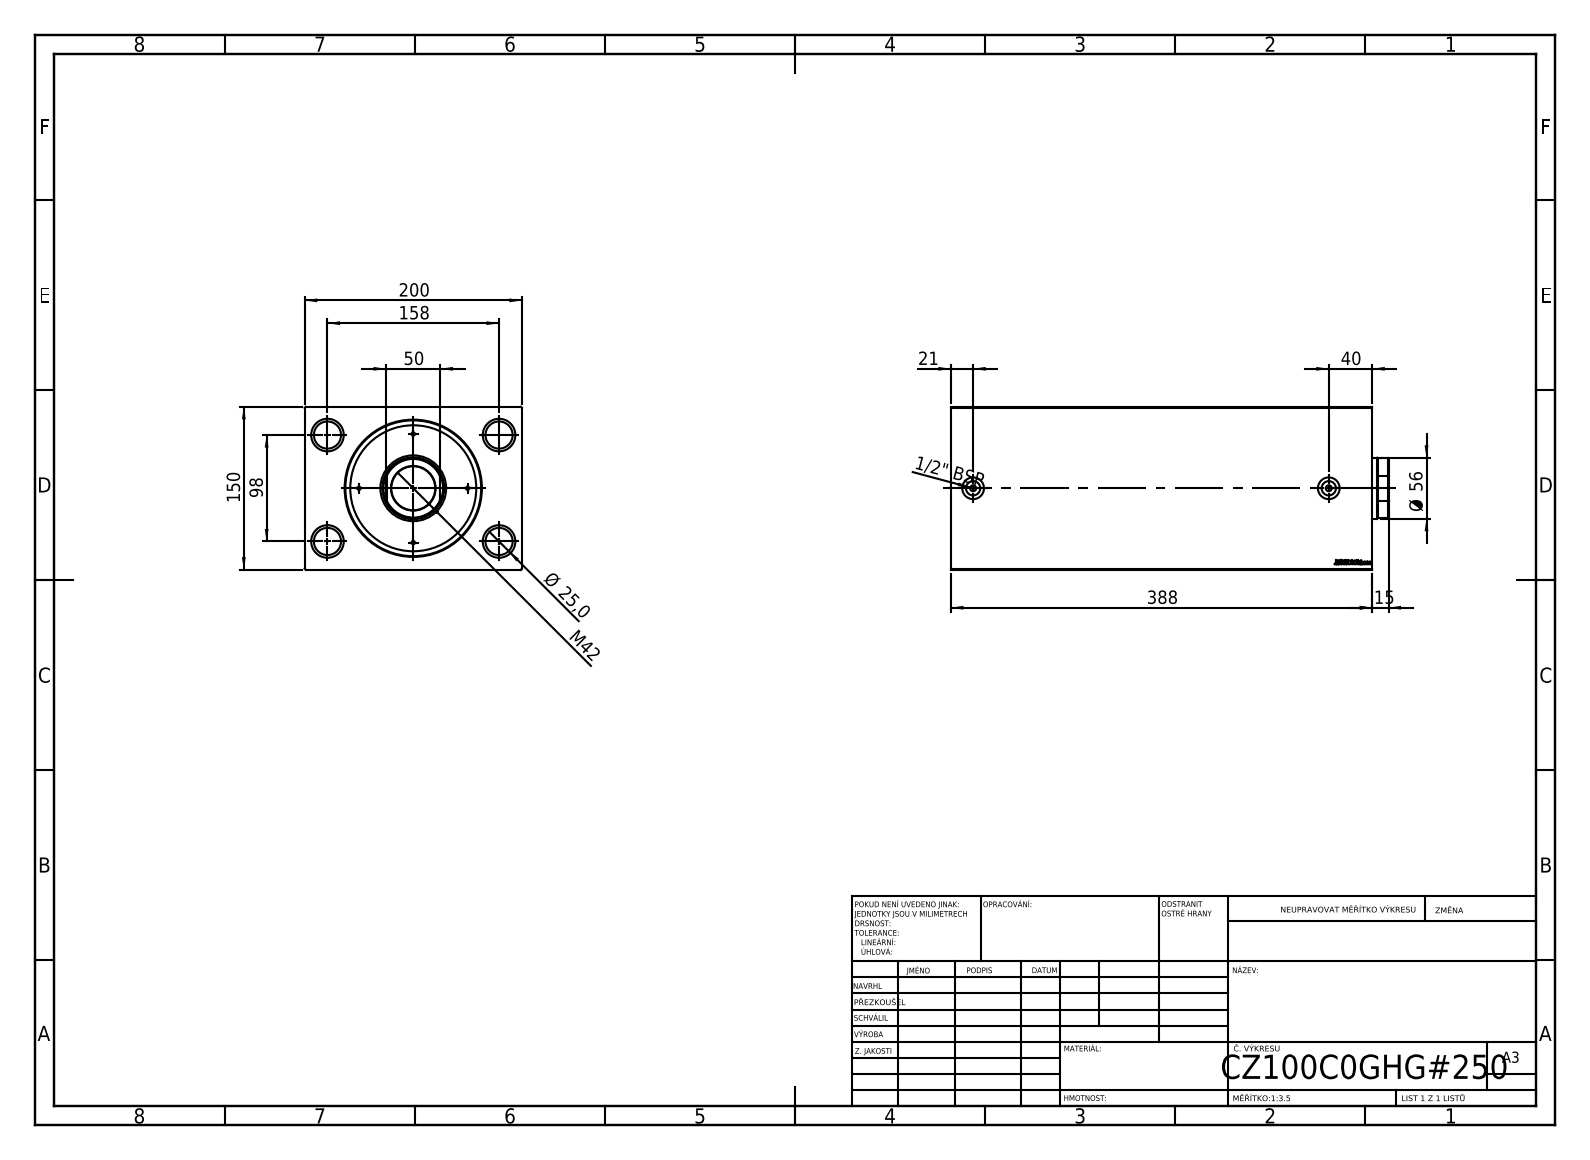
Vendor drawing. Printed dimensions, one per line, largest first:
388
200
158
150
98
Ø 56
50
M42
40
Ø 25,0
21
15
1/2" BSP
